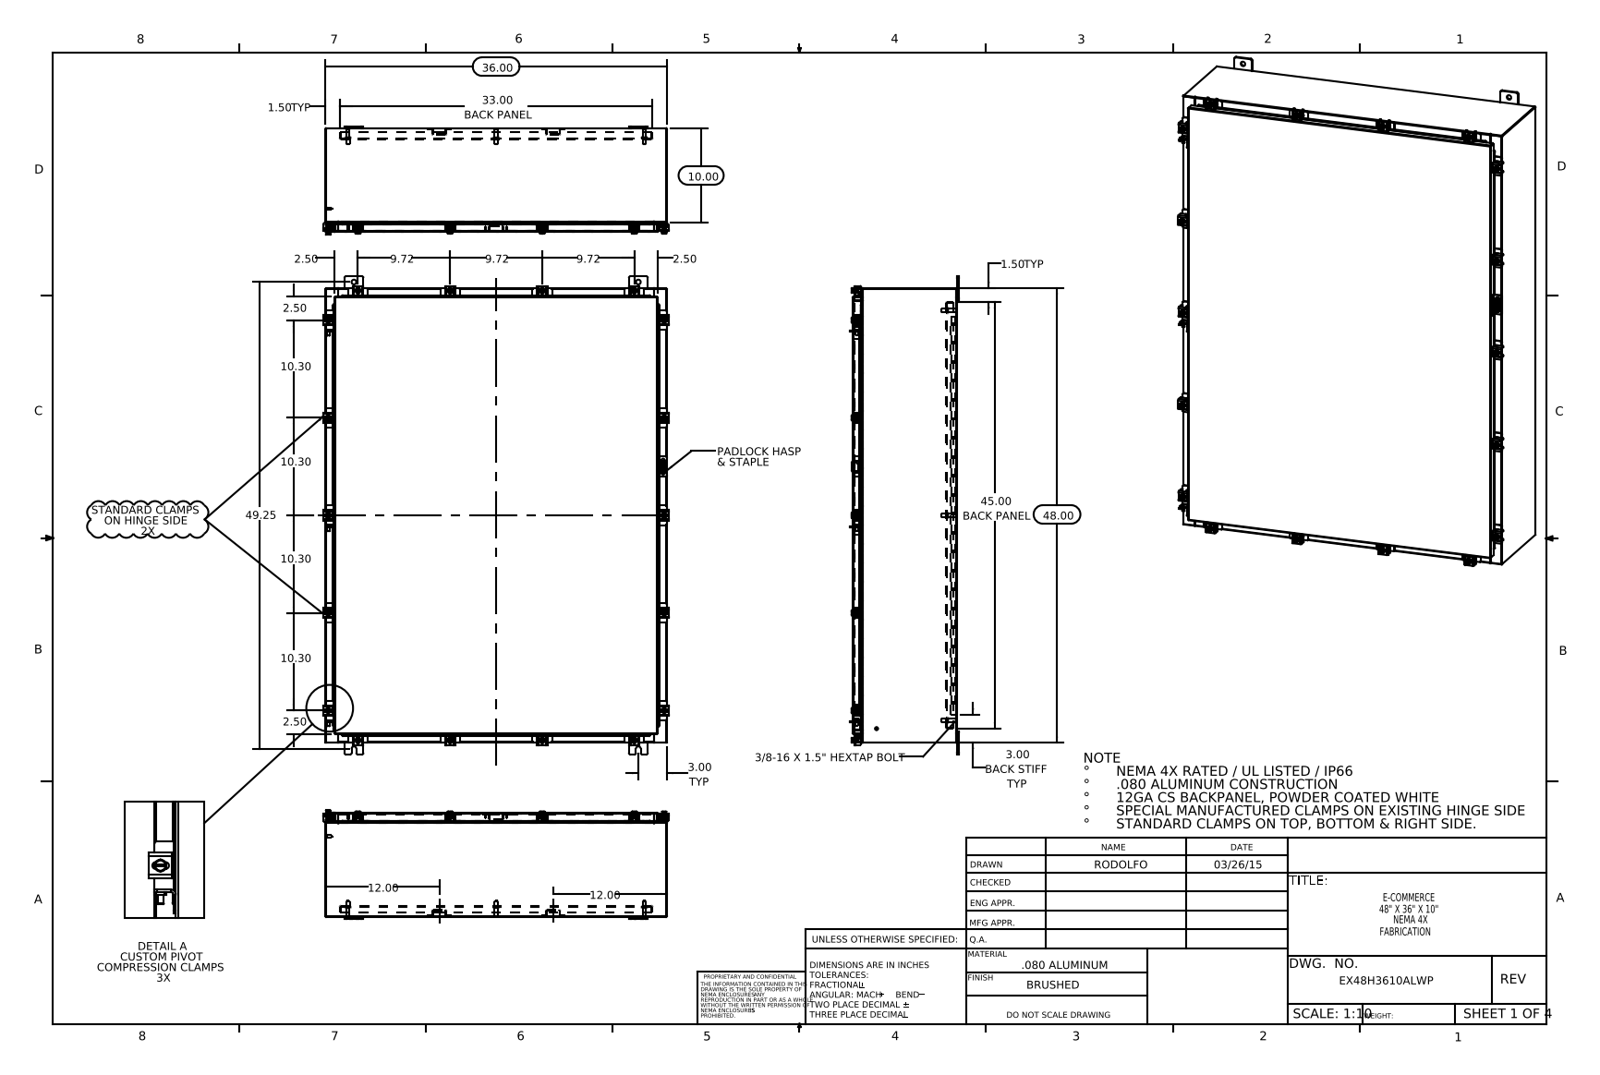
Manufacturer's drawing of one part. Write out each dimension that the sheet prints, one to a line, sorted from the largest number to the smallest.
49.25
48.00
45.00 BACK PANEL
36.00
33.00 BACK PANEL
12.00
12.00
10.30
10.30
10.30
10.30
10.00
9.72
9.72
9.72
3.00 TYP
3.00 BACK STIFF TYP
2.50
2.50
2.50
2.50
1.50 TYP
1.50 TYP
